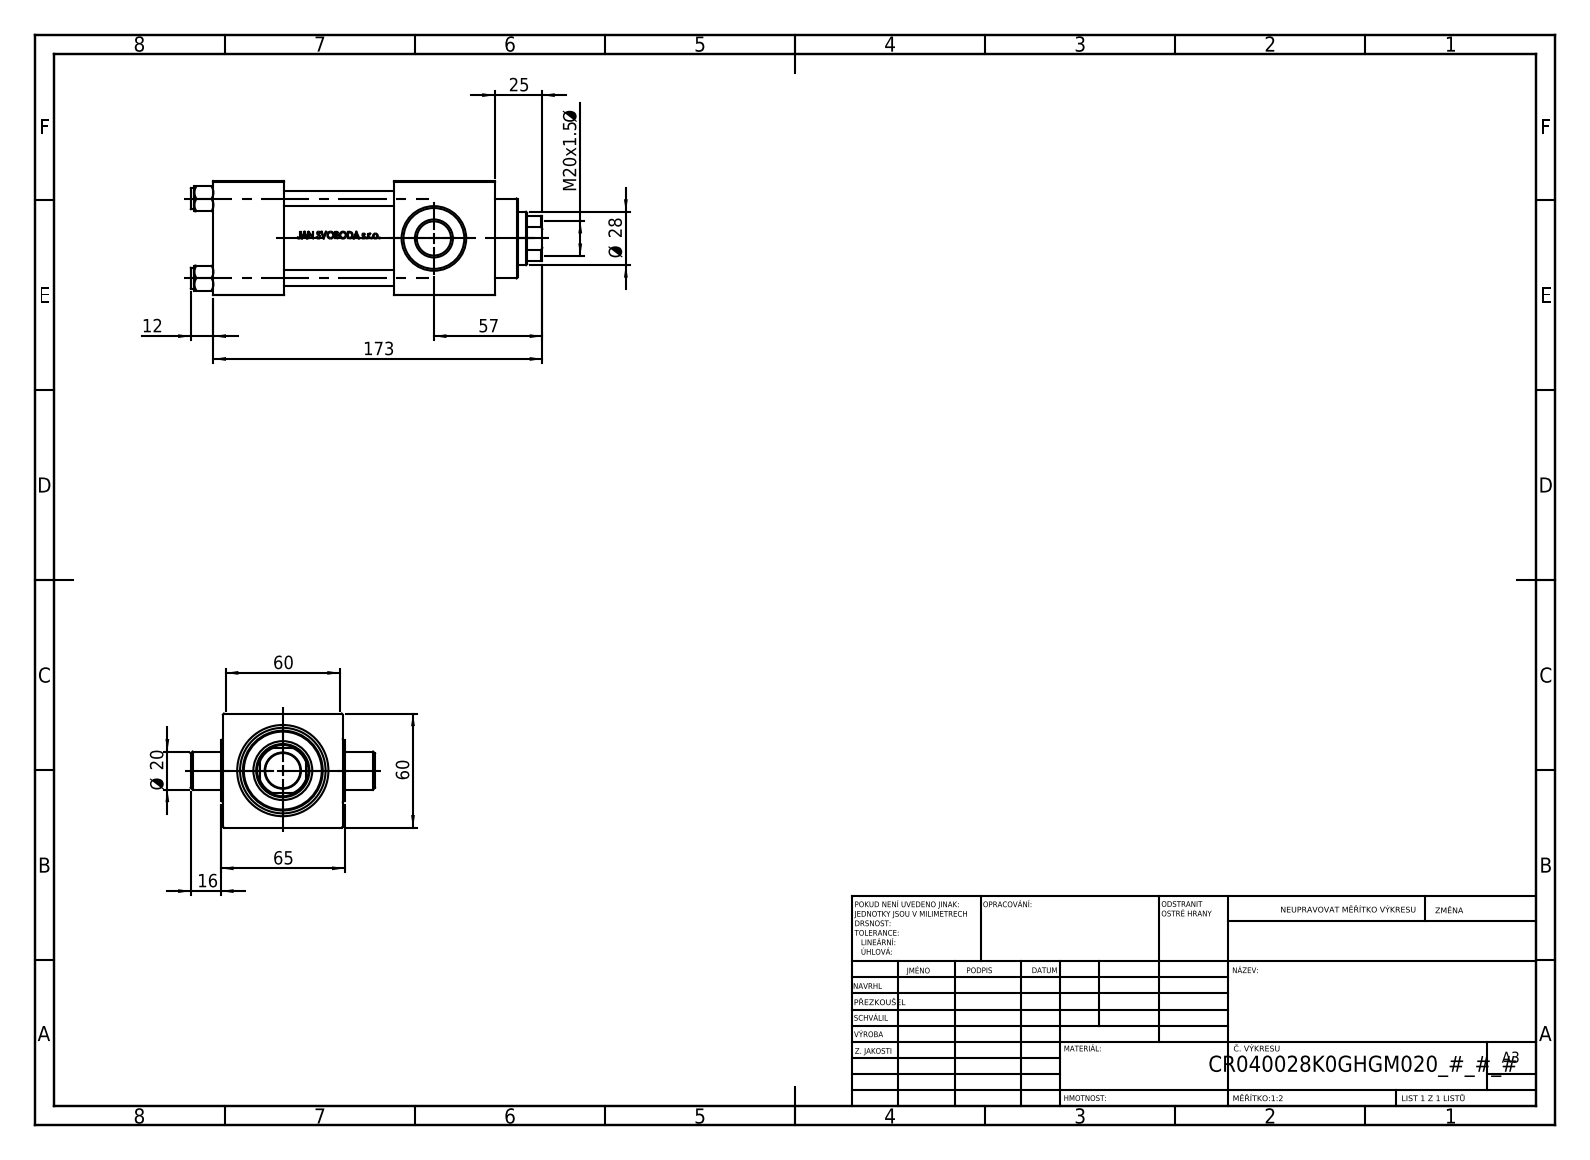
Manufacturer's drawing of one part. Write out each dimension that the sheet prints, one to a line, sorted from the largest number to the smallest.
173
65
60
60
57
Ø 28
25
M20x1.5 Ø
Ø 20
16
12
